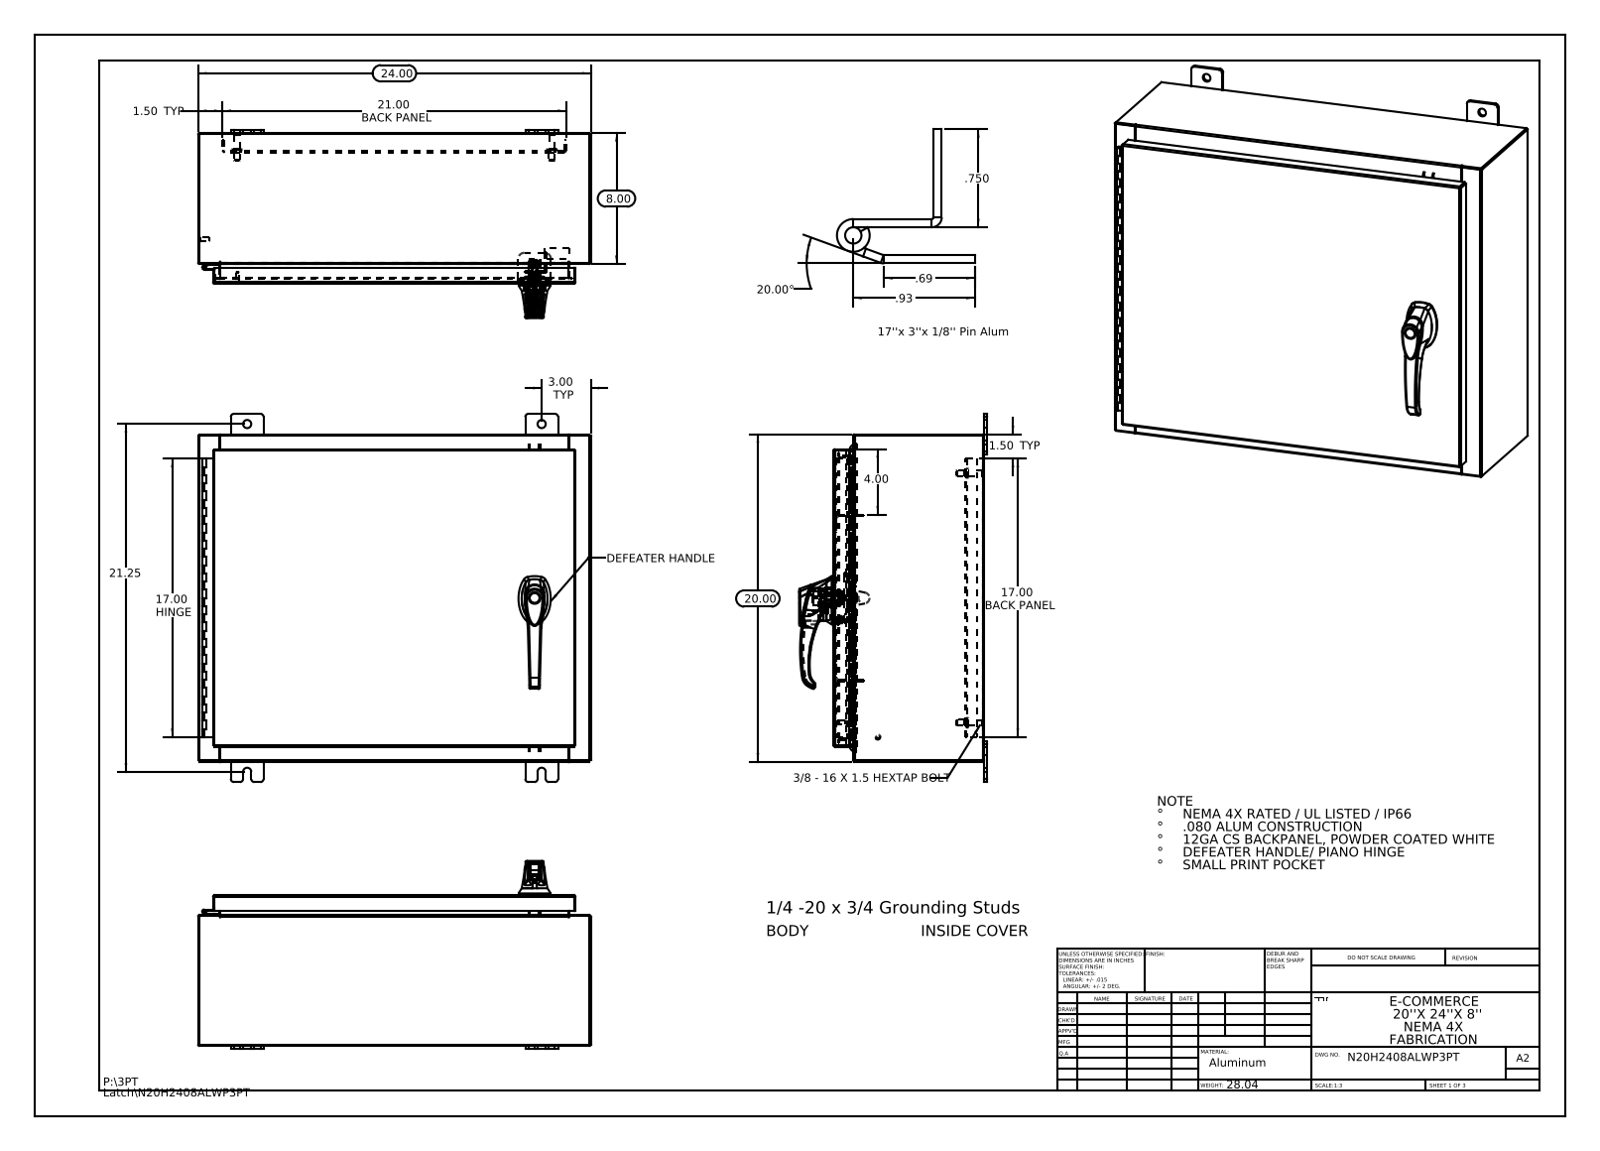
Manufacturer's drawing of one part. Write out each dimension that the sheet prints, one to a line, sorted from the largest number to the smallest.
24.00
21.25
21.00 BACK PANEL
20.00
20.00°
17.00 HINGE
17.00 BACK PANEL
8.00
4.00
3.00 TYP
1.50 TYP
1.50 TYP
.93
.750
.69
